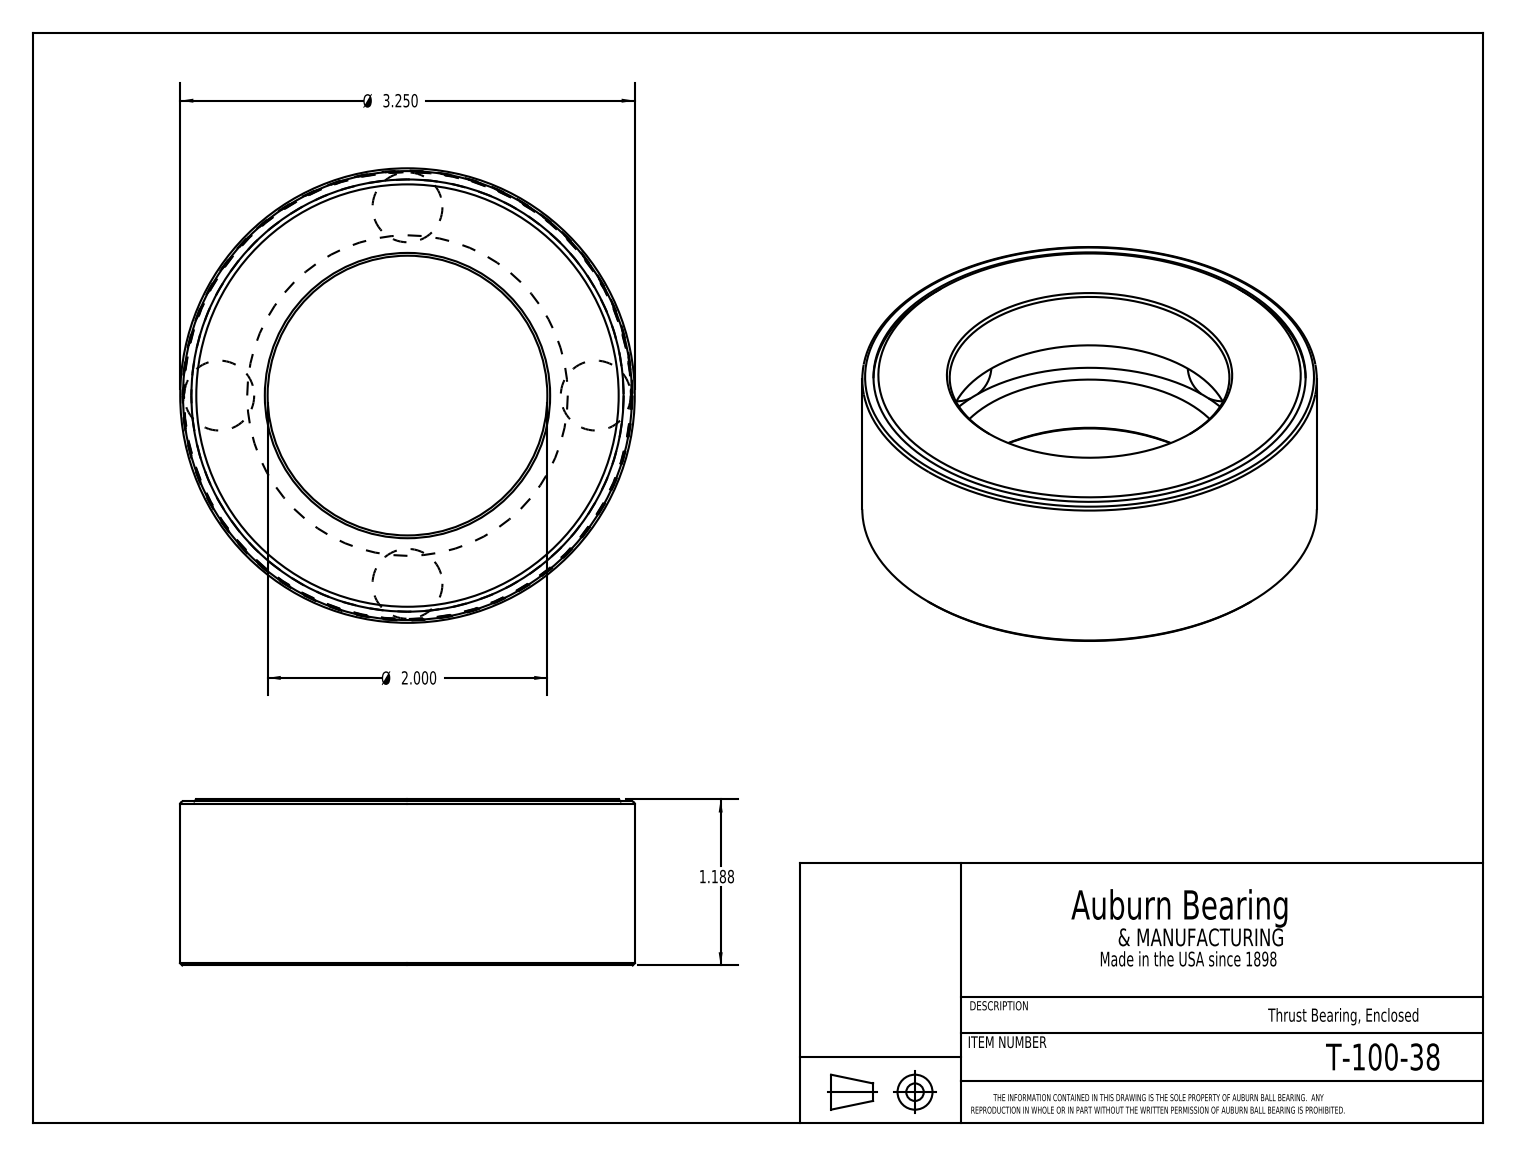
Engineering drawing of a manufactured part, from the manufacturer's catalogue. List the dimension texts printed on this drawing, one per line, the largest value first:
Ø 3.250
Ø 2.000
1.188
